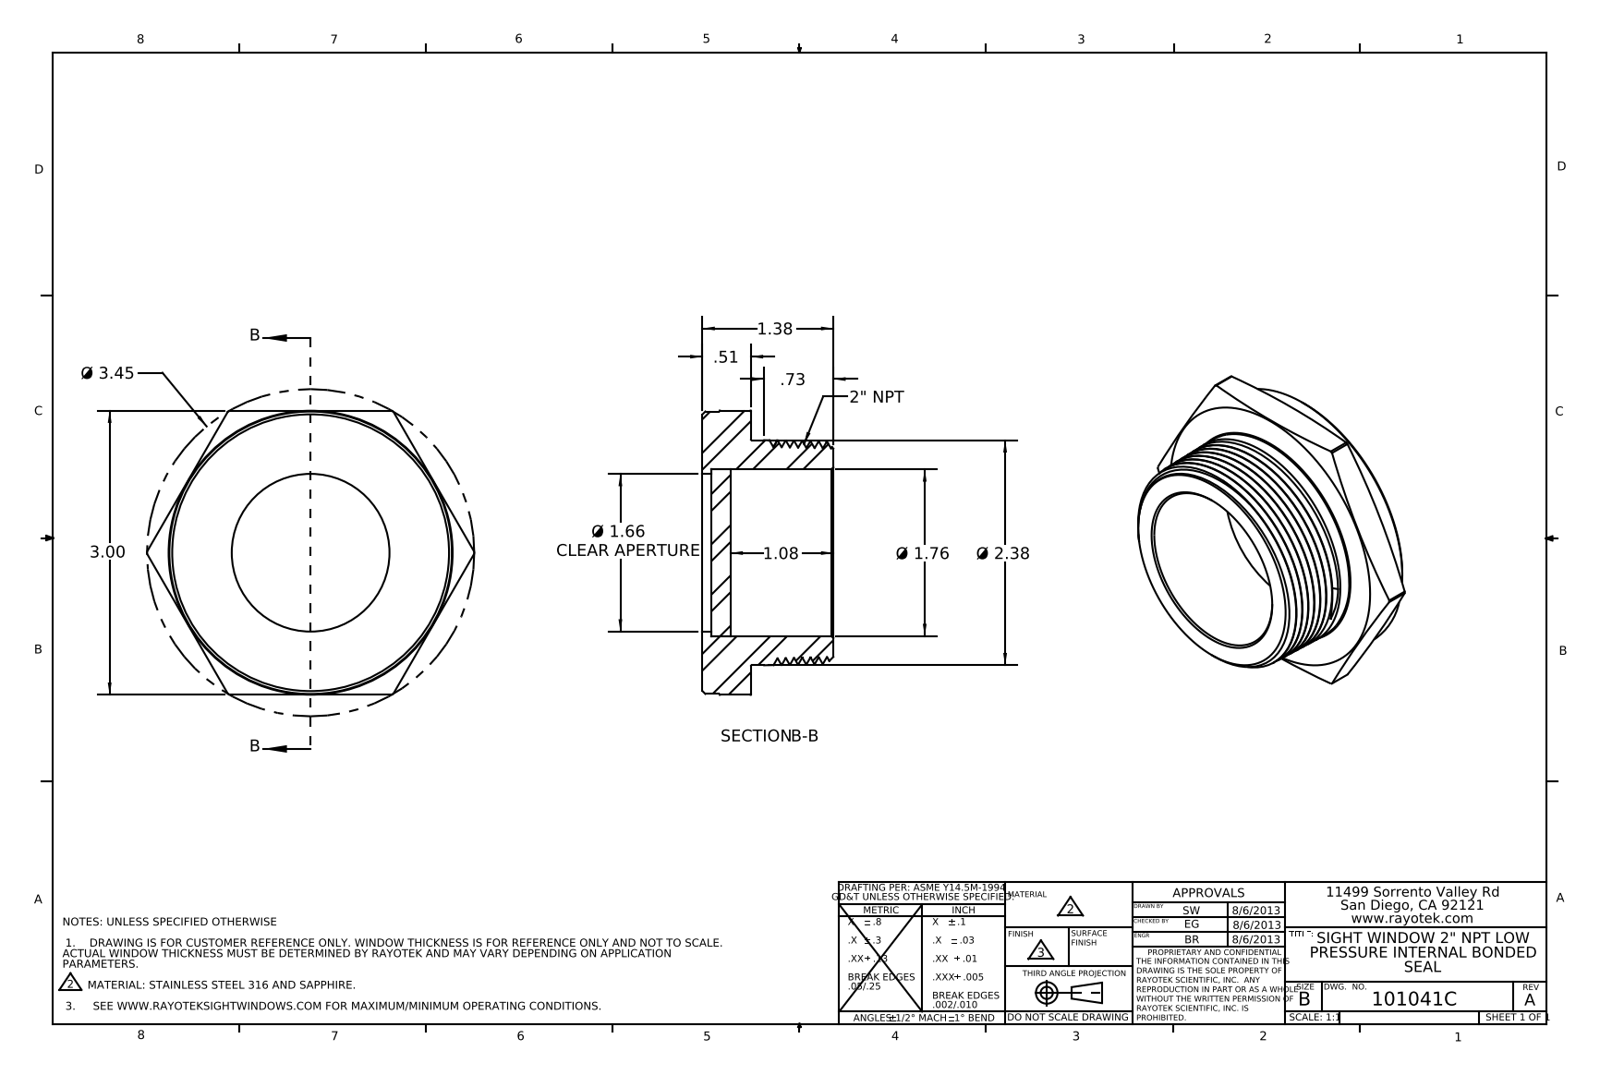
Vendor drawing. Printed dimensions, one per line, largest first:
Ø 3.45
3.00
Ø 2.38
Ø 1.76
Ø 1.66 CLEAR APERTURE
1.38
1.08
.73
.51
